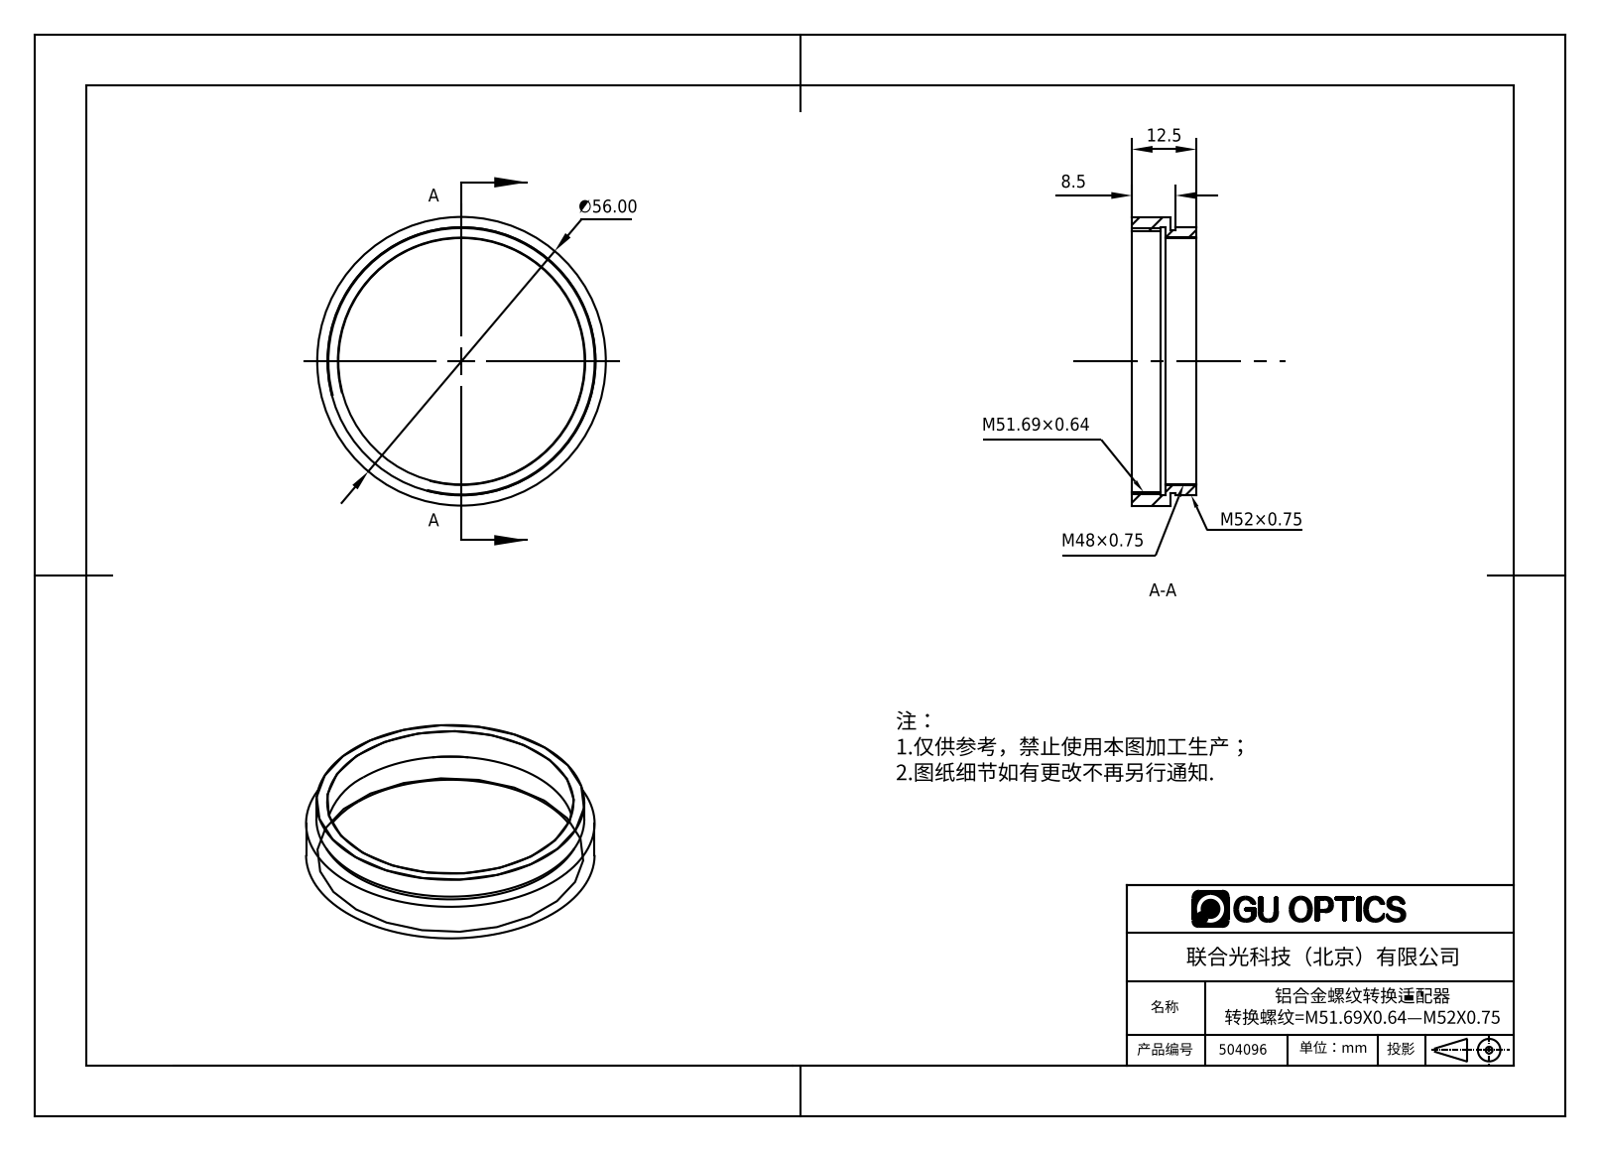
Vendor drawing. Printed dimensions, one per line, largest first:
∅56.00
12.5
8.5
